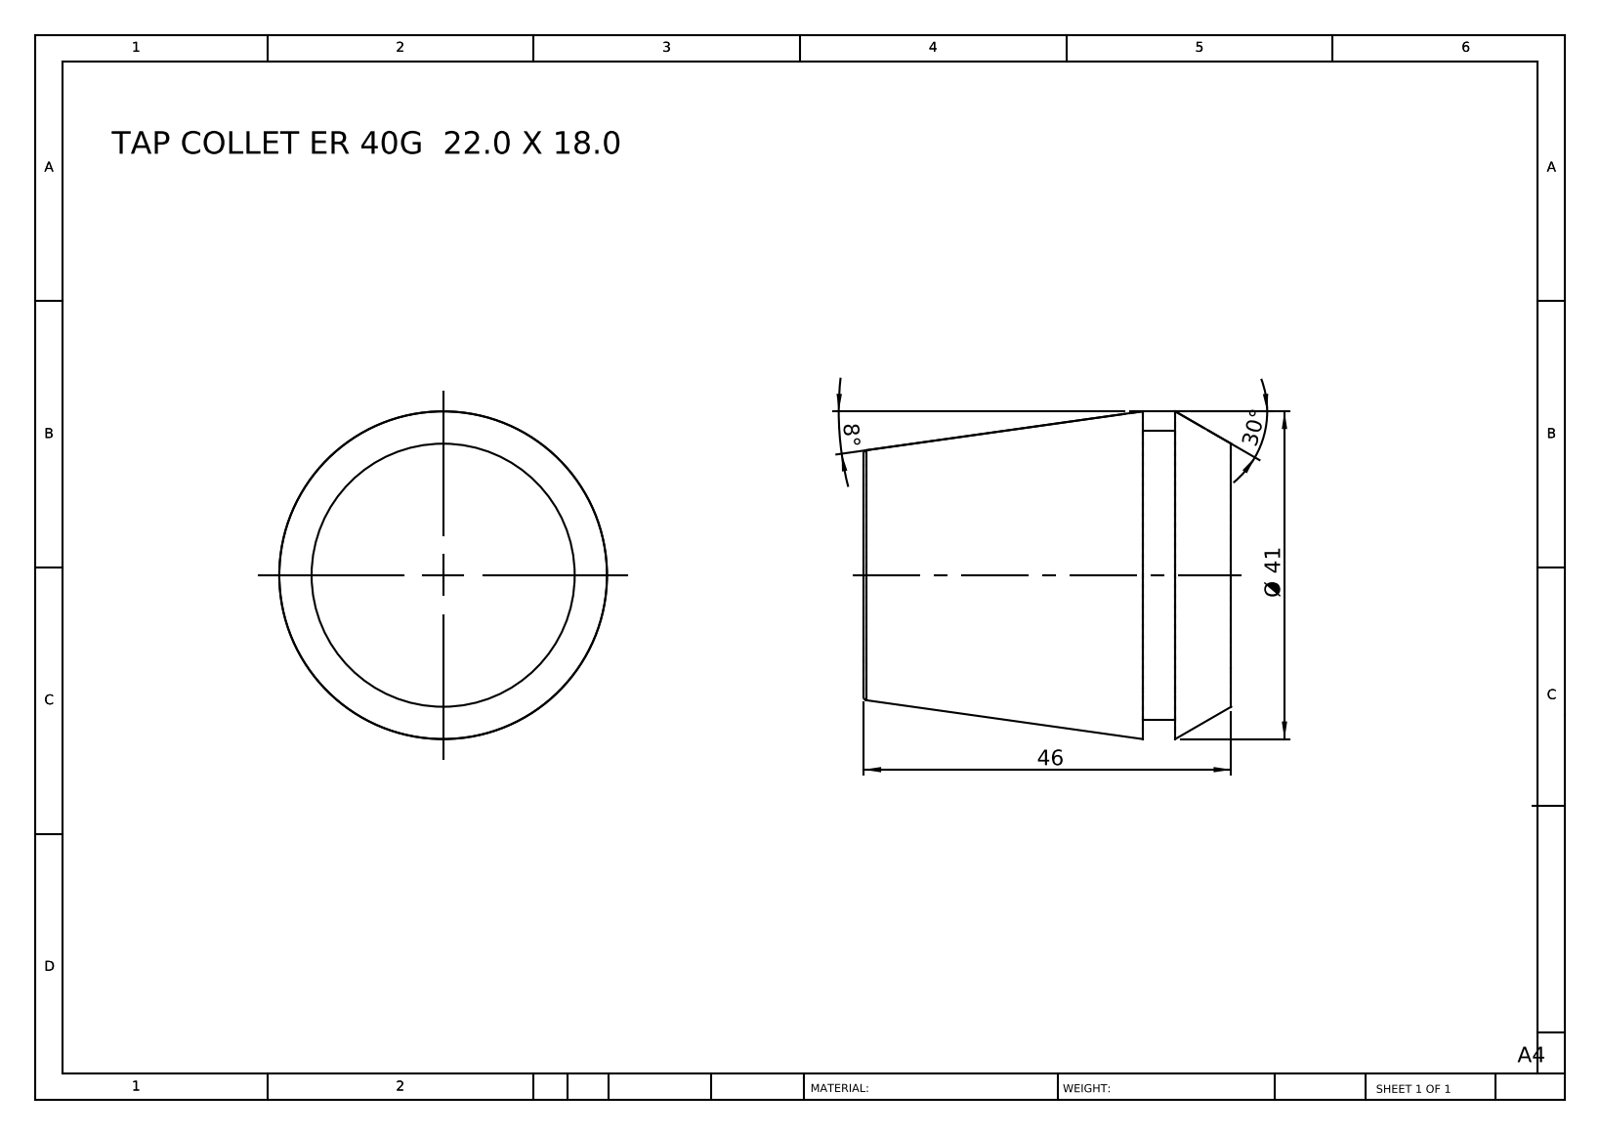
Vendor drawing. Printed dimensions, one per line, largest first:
46
Ø 41
30°
8°
